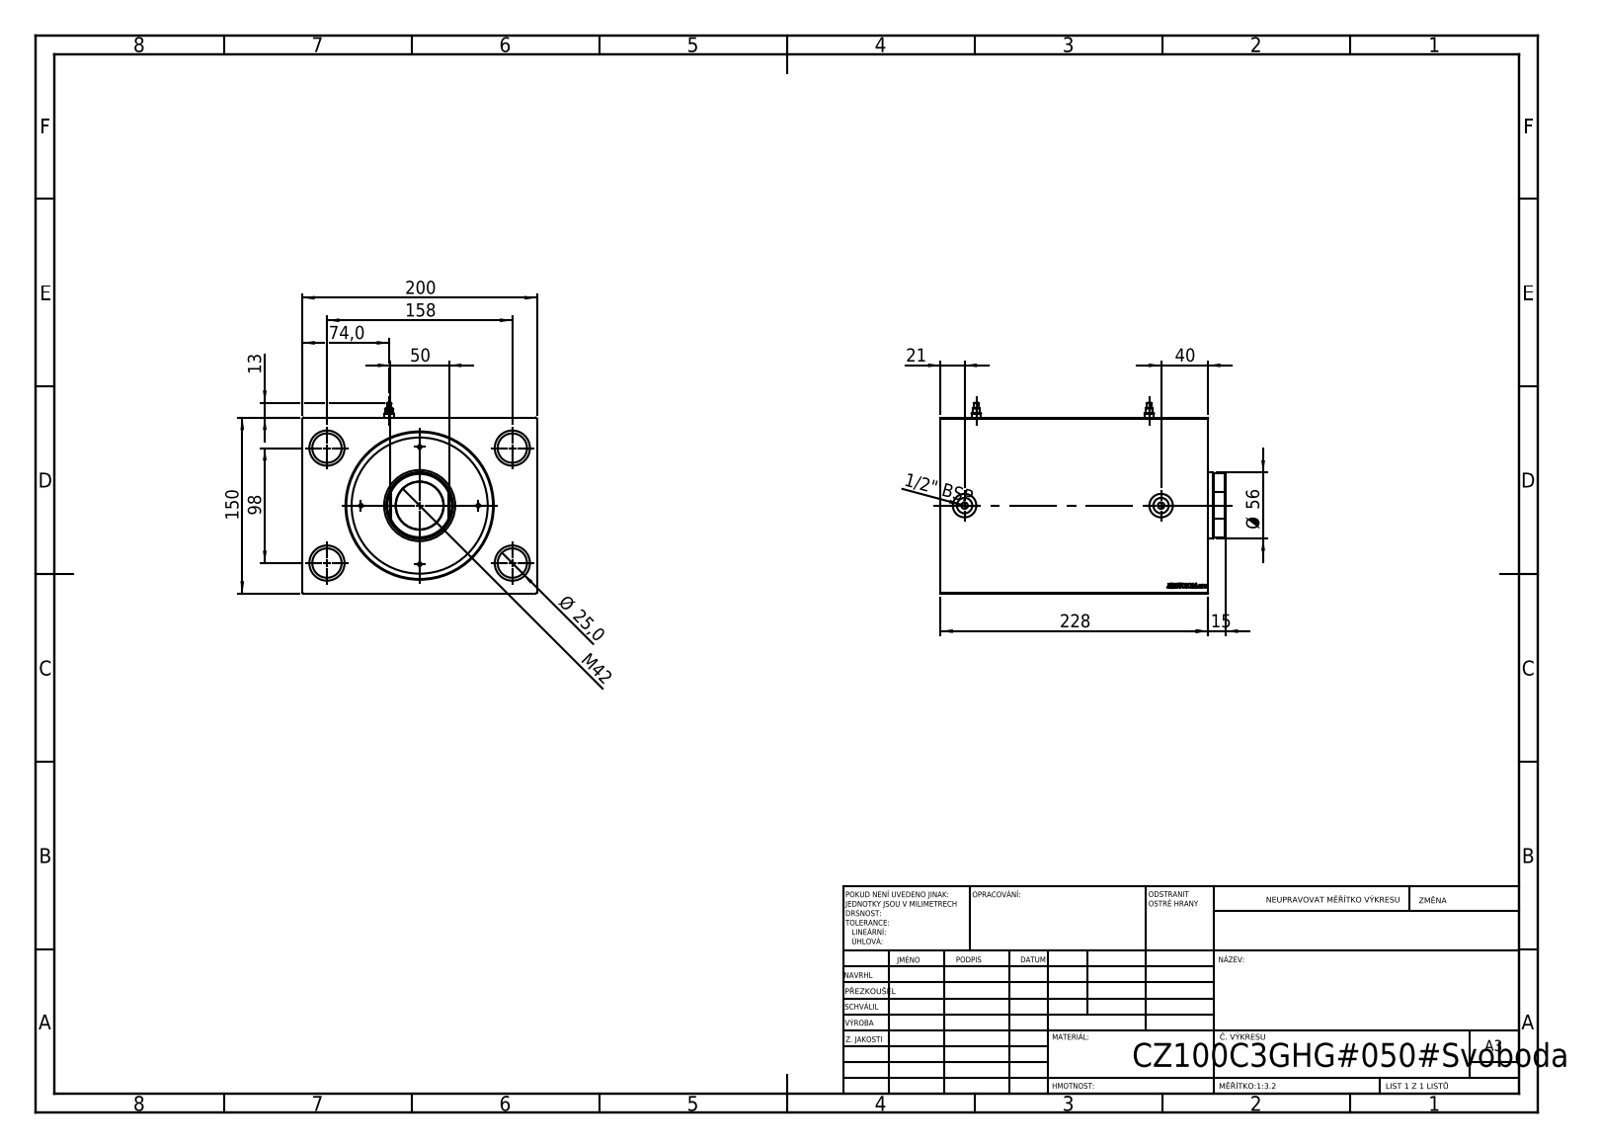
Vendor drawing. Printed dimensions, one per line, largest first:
228
200
158
150
98
74,0
Ø 56
50
M42
40
Ø 25,0
21
15
13
1/2" BSP
